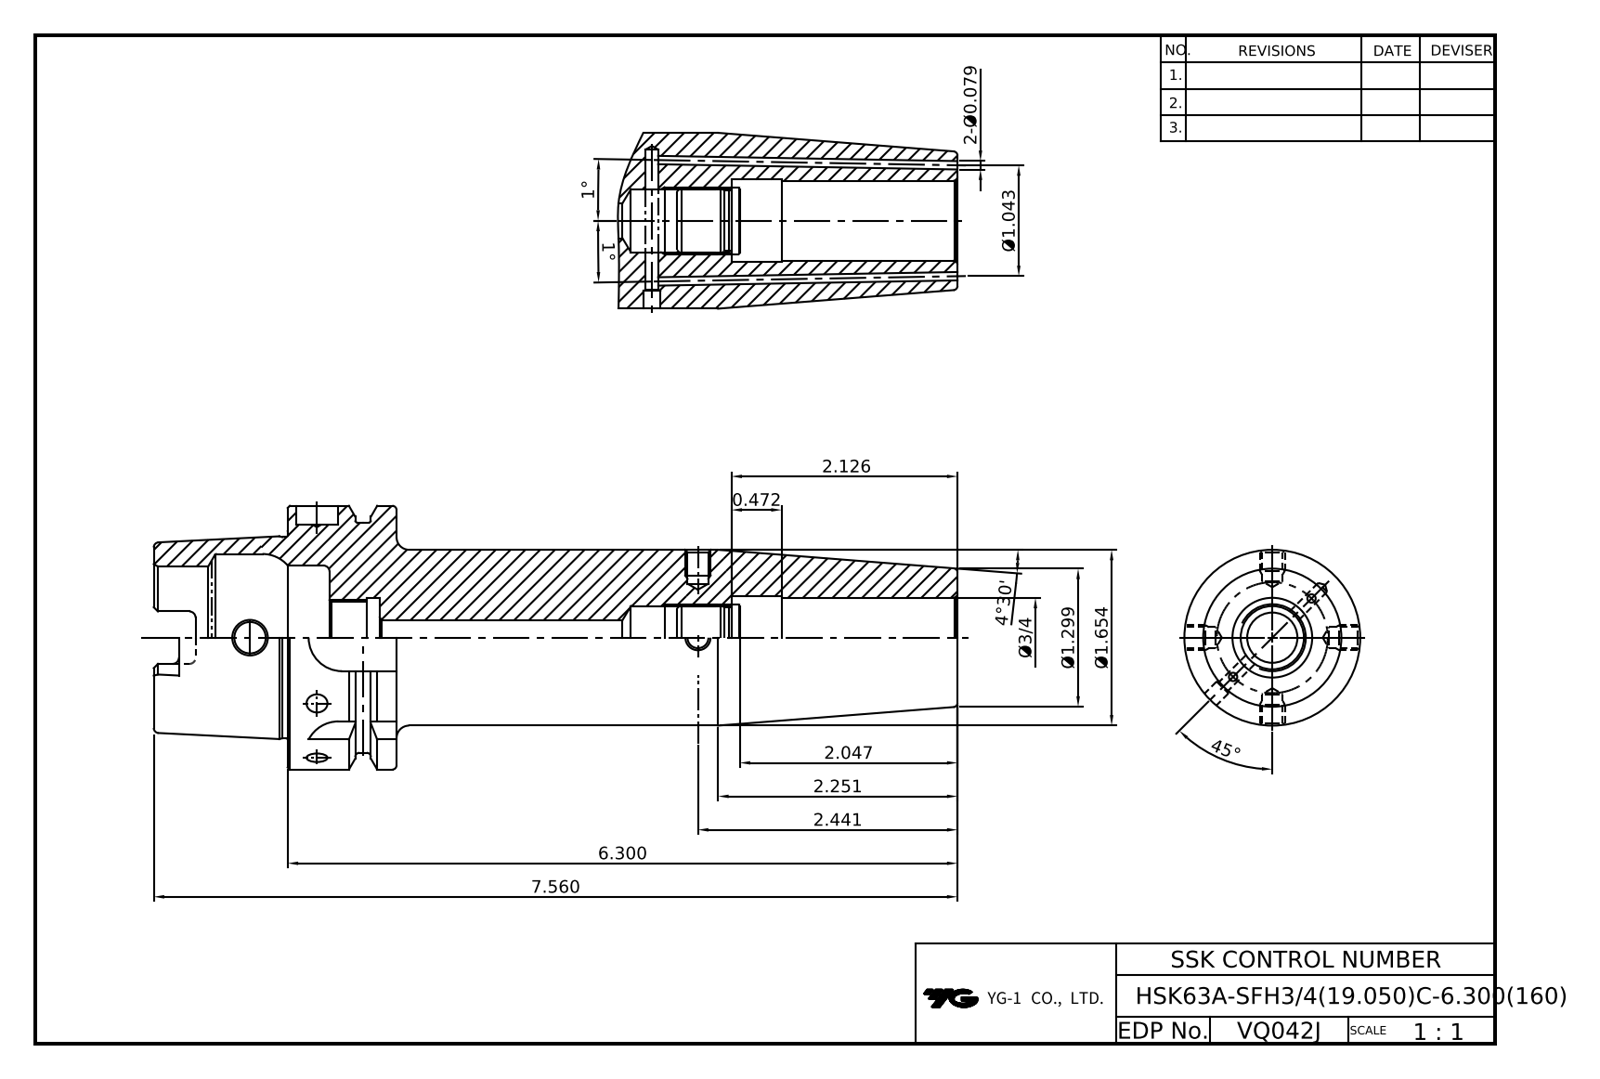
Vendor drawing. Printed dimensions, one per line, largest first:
45°
7.560
6.300
4°30'
2.441
2.251
2.126
2.047
Ø1.654
Ø1.299
Ø1.043
1°
1°
0.472
2-Ø0.079
